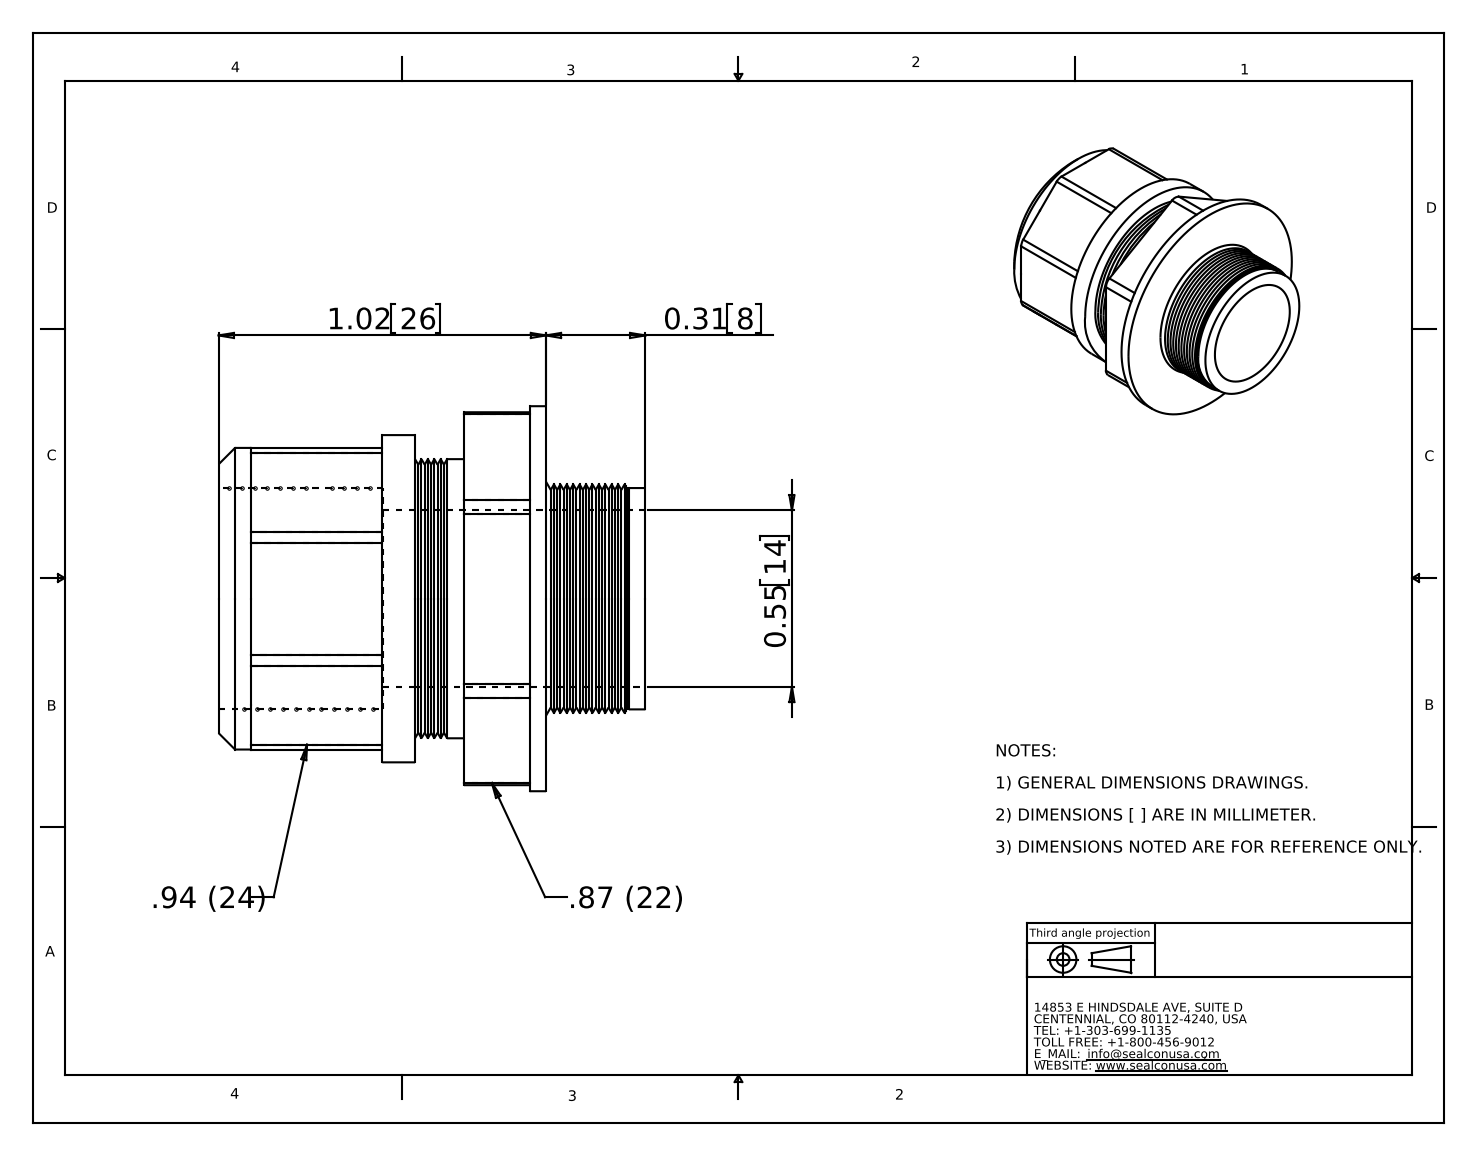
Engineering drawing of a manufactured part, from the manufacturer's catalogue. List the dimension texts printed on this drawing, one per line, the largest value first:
1.02 26
0.55 14
0.31 8
